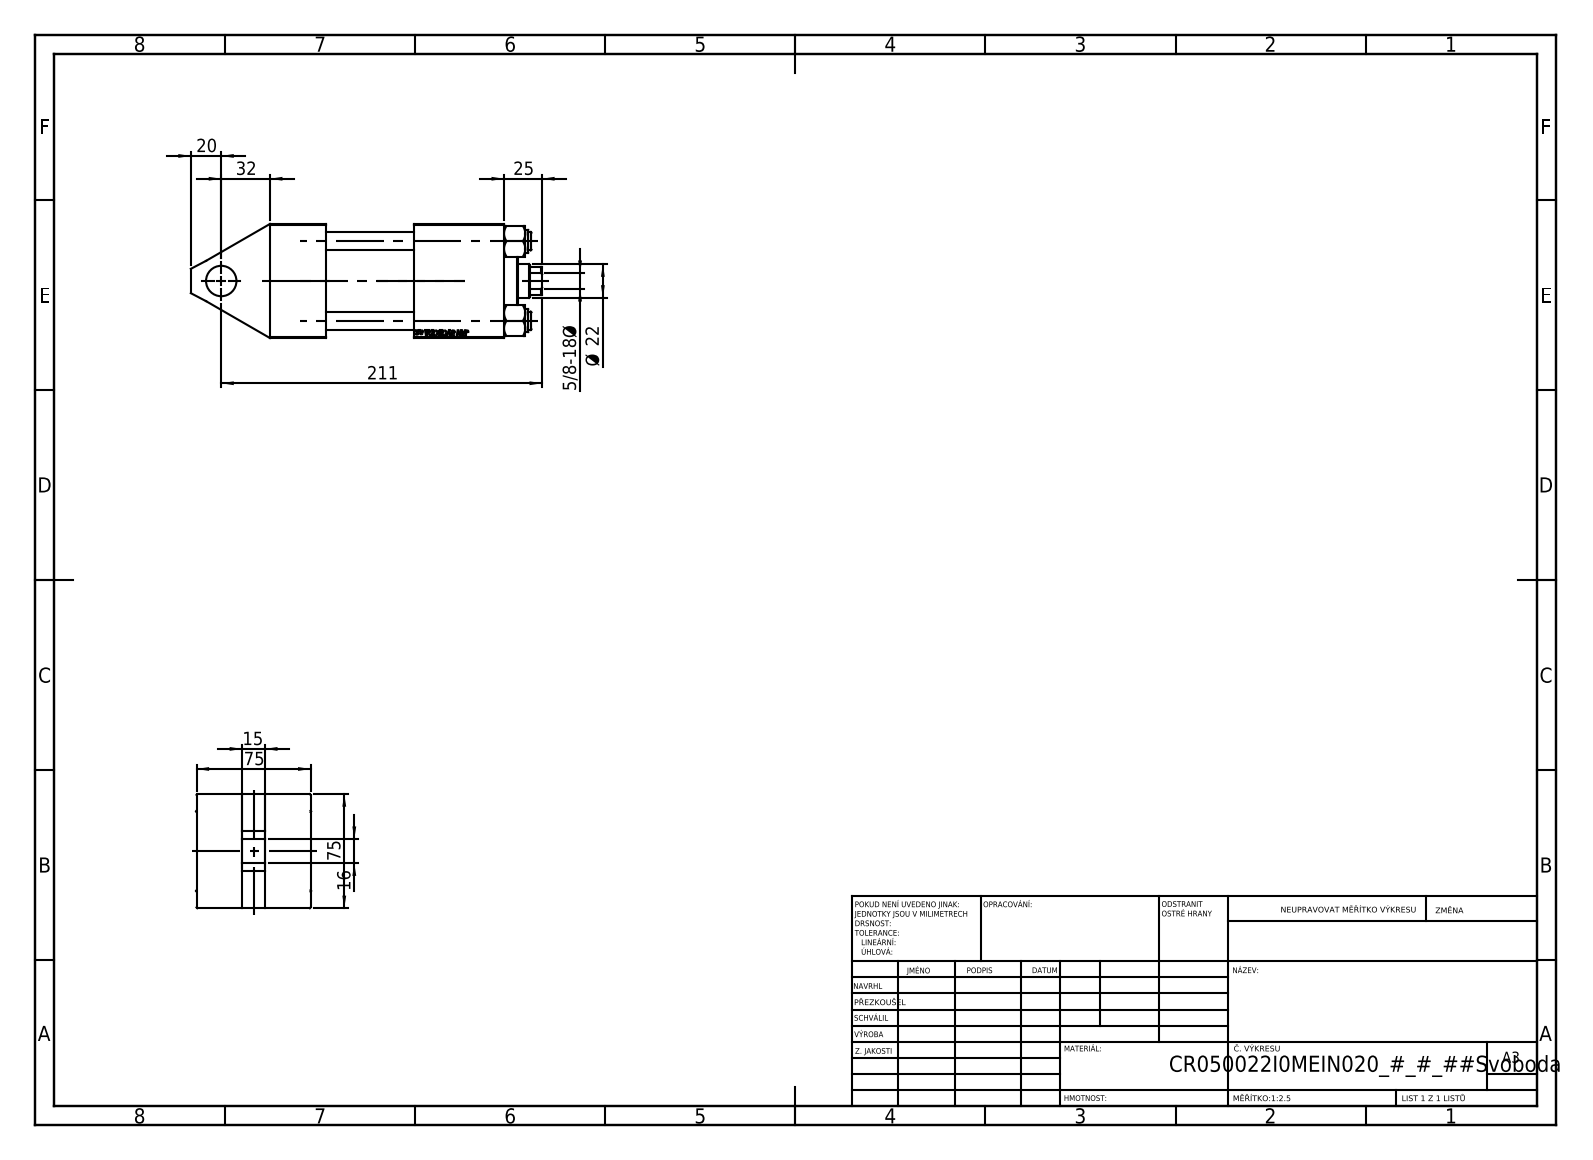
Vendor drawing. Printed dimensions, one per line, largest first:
211
75
75
32
25
Ø 22
20
16
15
5/8-18 Ø
